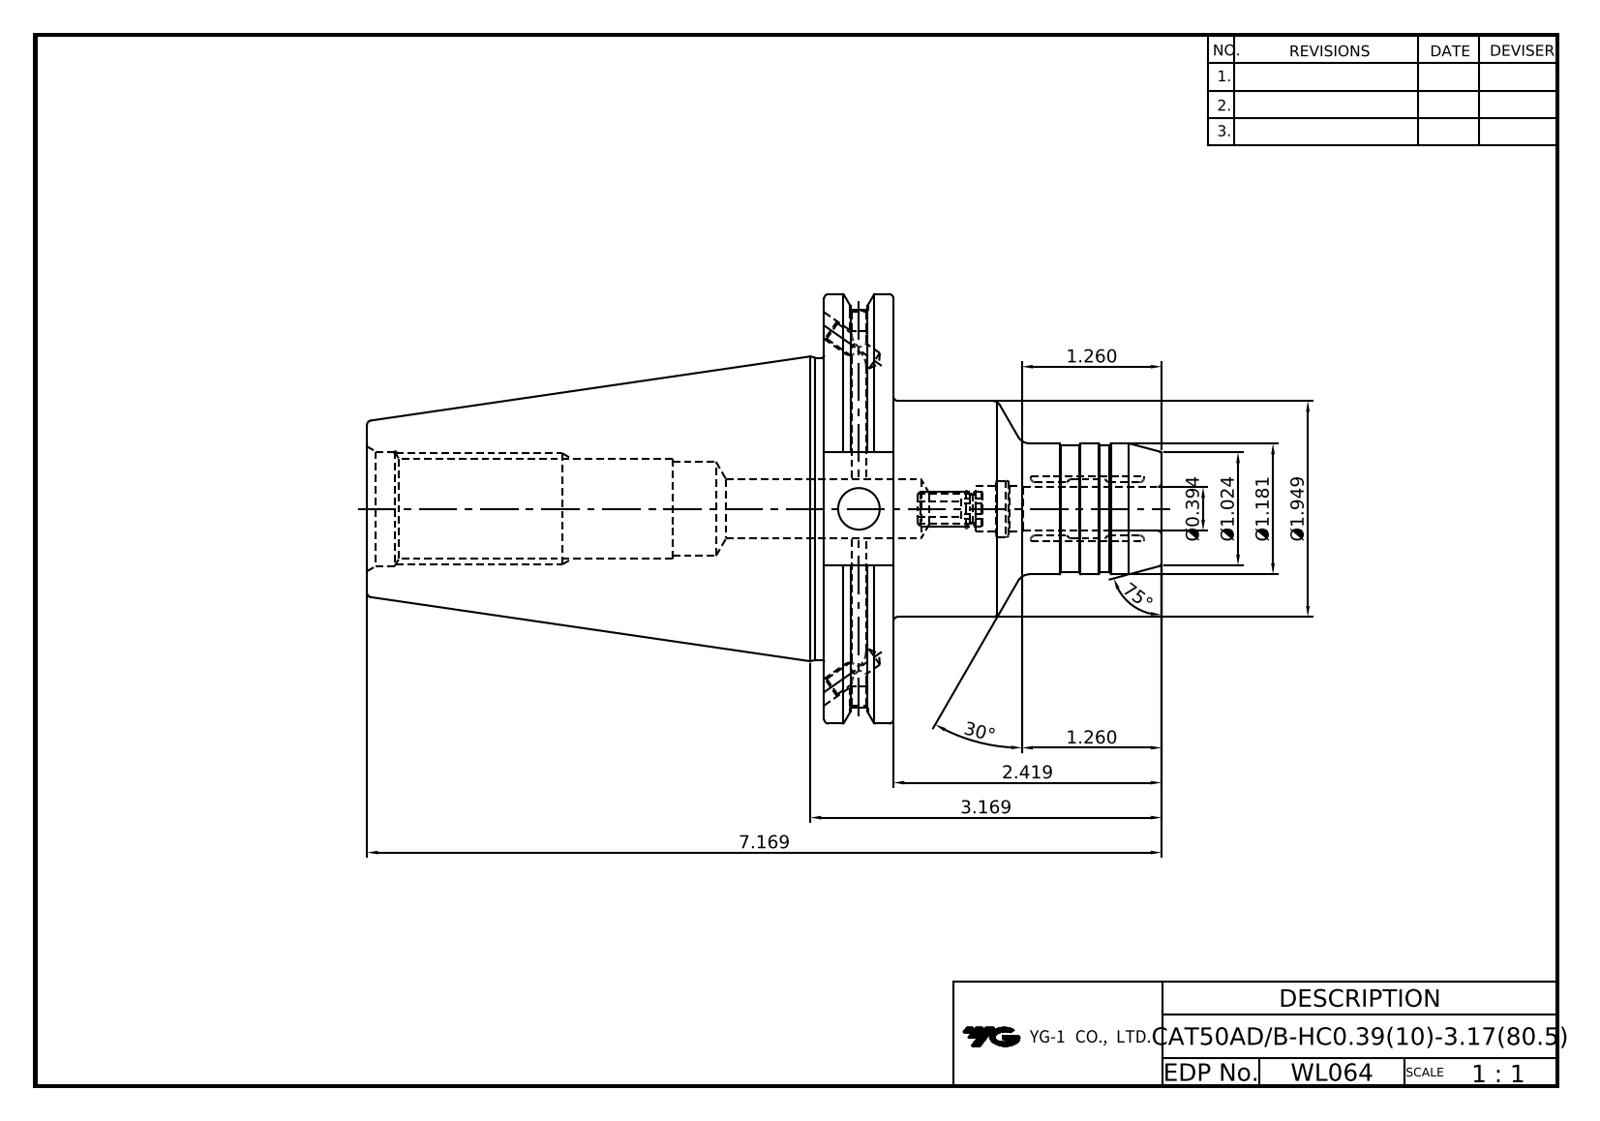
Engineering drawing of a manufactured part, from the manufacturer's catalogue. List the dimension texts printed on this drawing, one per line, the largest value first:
75°
30°
7.169
3.169
2.419
Ø1.949
1.260
1.260
Ø1.181
Ø1.024
Ø0.394
